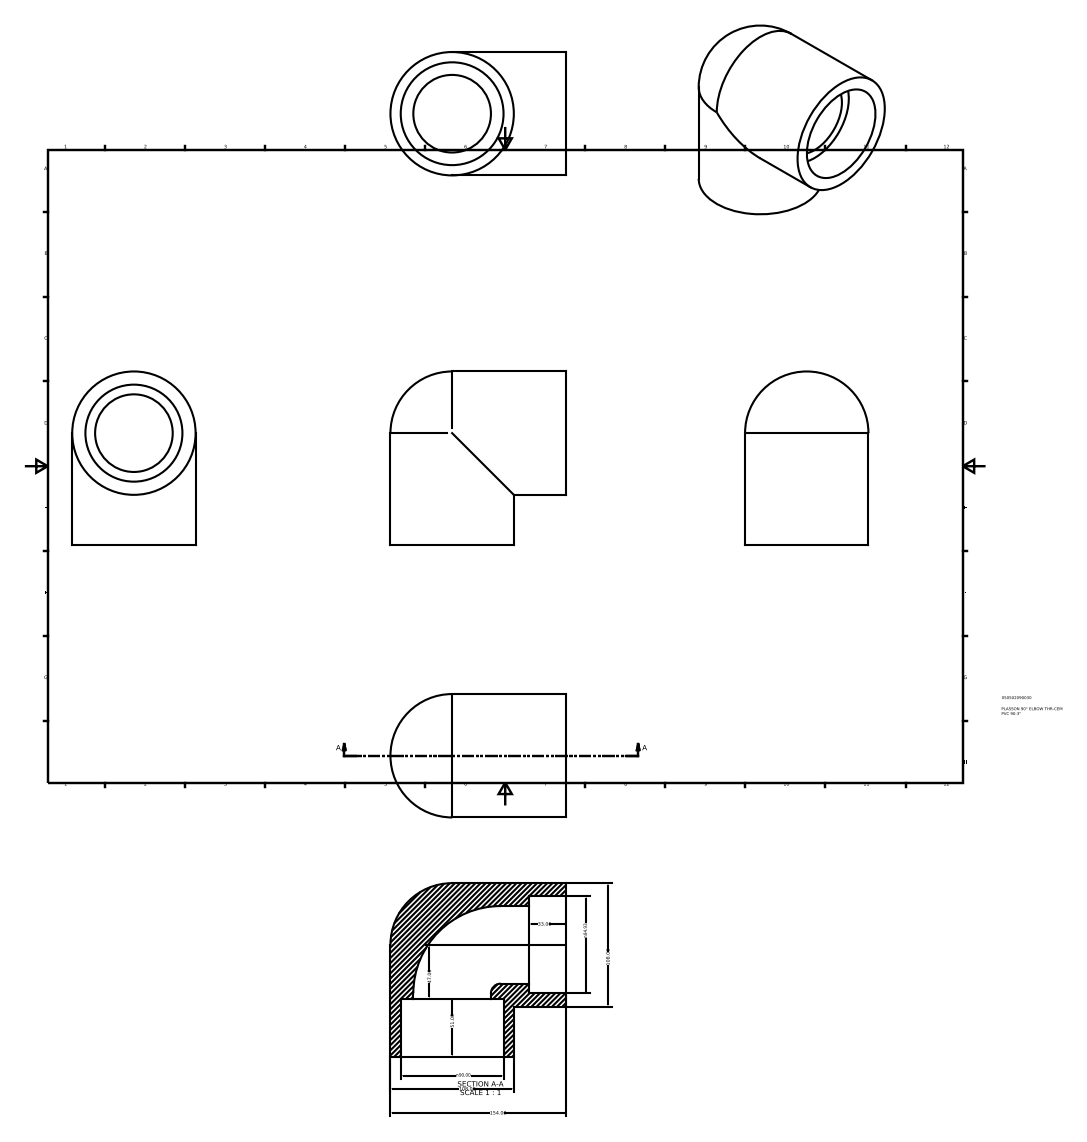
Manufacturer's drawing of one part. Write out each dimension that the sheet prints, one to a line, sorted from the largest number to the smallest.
154.00
108.00
108.00
n90.00
n84.93
51.00
47.00
33.00
